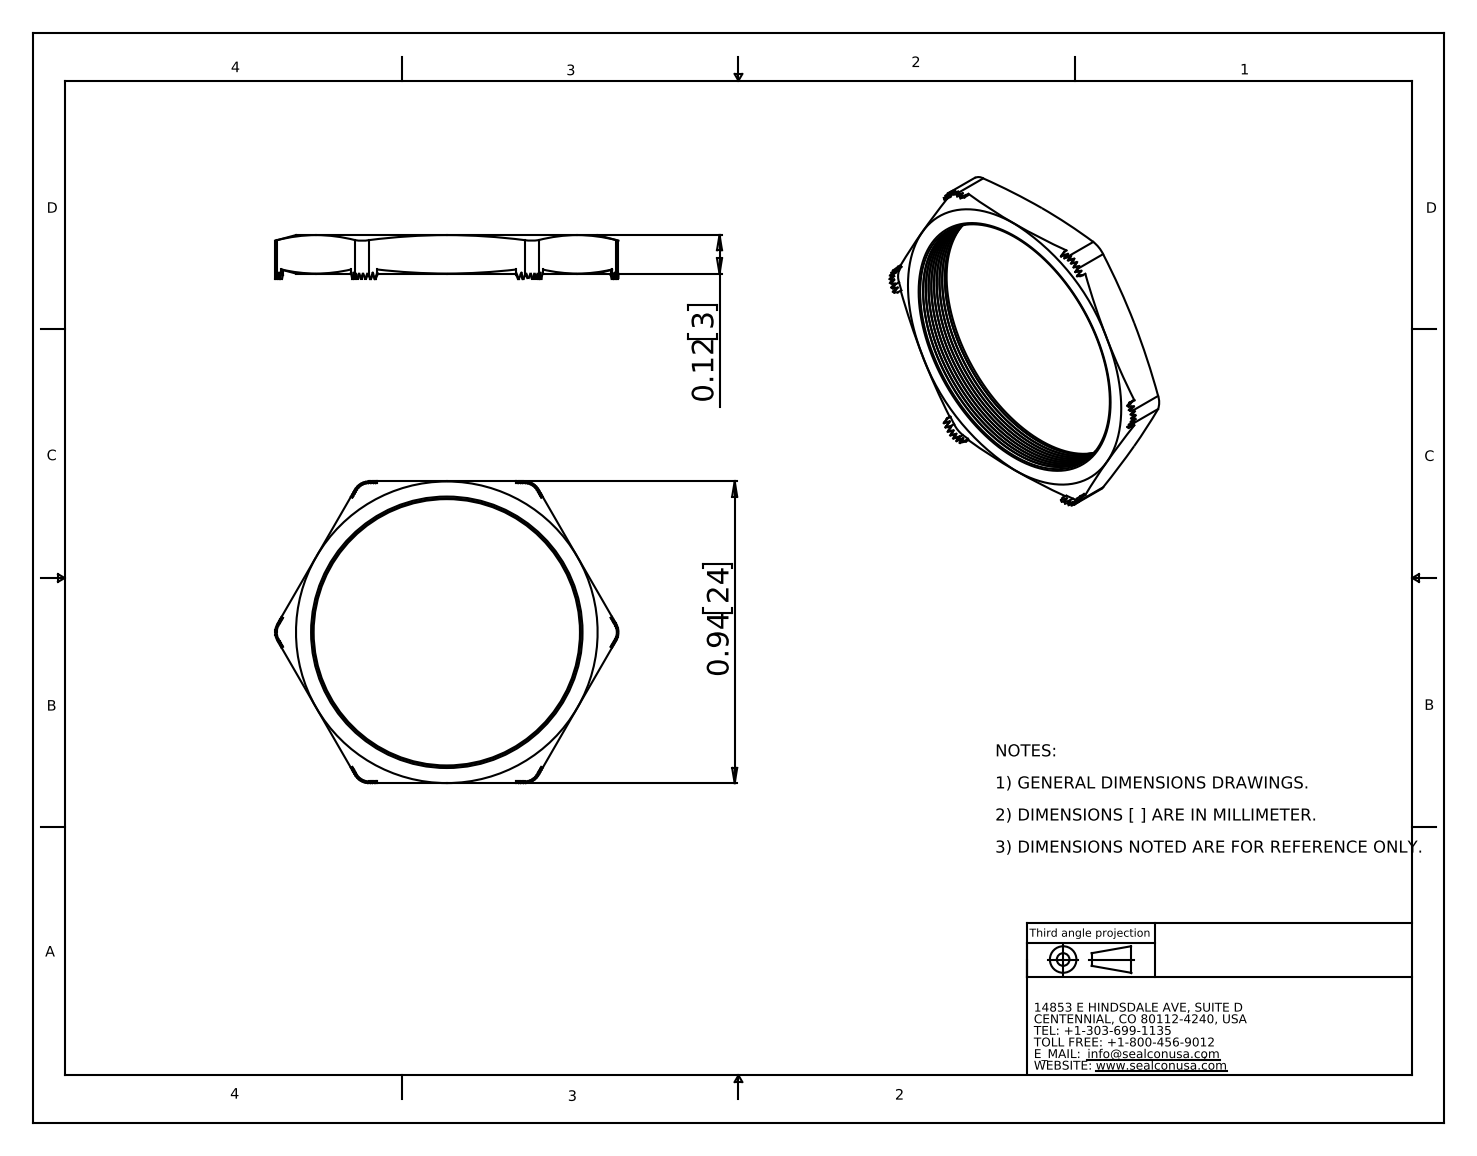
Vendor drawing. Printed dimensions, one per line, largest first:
0.94 24
0.12 3
